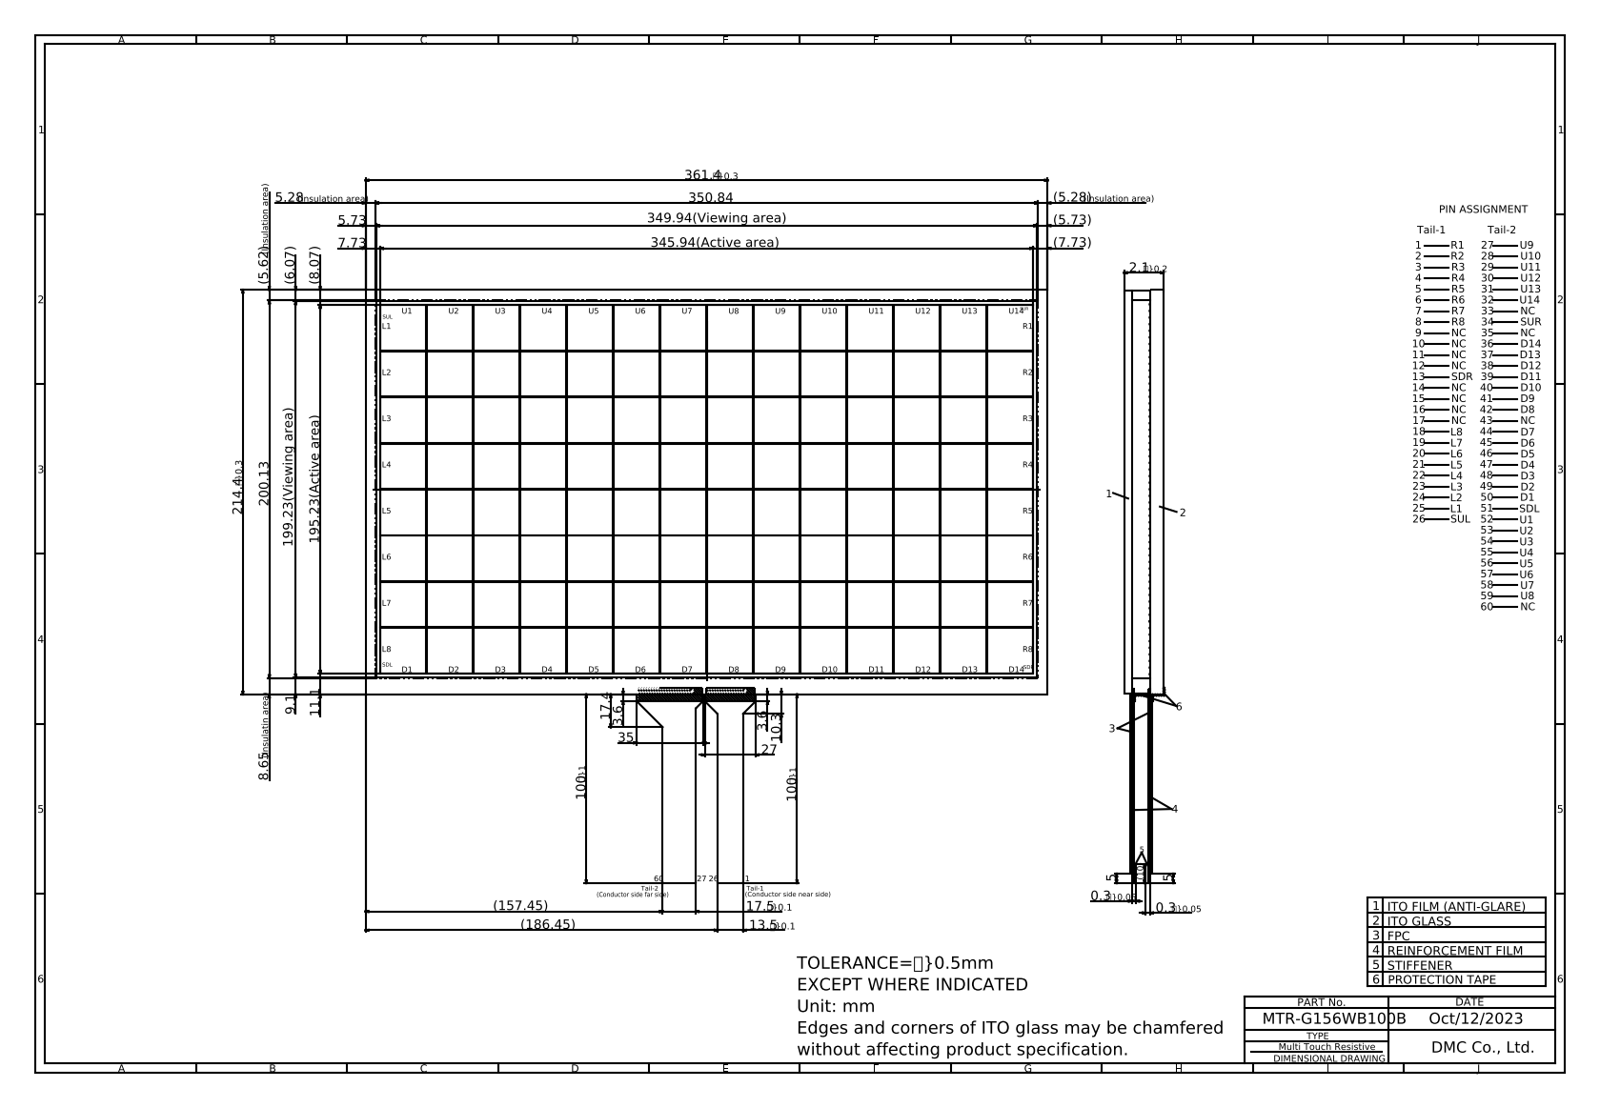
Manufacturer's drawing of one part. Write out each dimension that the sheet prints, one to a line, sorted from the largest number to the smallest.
361.40
350.84
349.94(Viewing area)
345.94(Active area)
214.39
200.13
199.23(Viewing area)
195.23(Active area)
(186.45)
(157.45)
100.00
100.00
35
27
17.50
17.4
13.50
11.1
10.3
(10)
9.1
8.65{\H0.6667x;(Insulatin area)}
(8.07)
7.73
(7.73)
(6.07)
5.73
(5.73)
(5.61){\H0.6667x;(Insulation area)}
(5.28){\H0.6667x;(Insulation area)}
5.28{\H0.6667x;(Insulation area)}
5
5
3.6
3.6
2.1{\H0.6667x;?}0.2}
0.3{\H0.6667x;?}0.05}
0.3{\H0.6667x;?}0.05}
